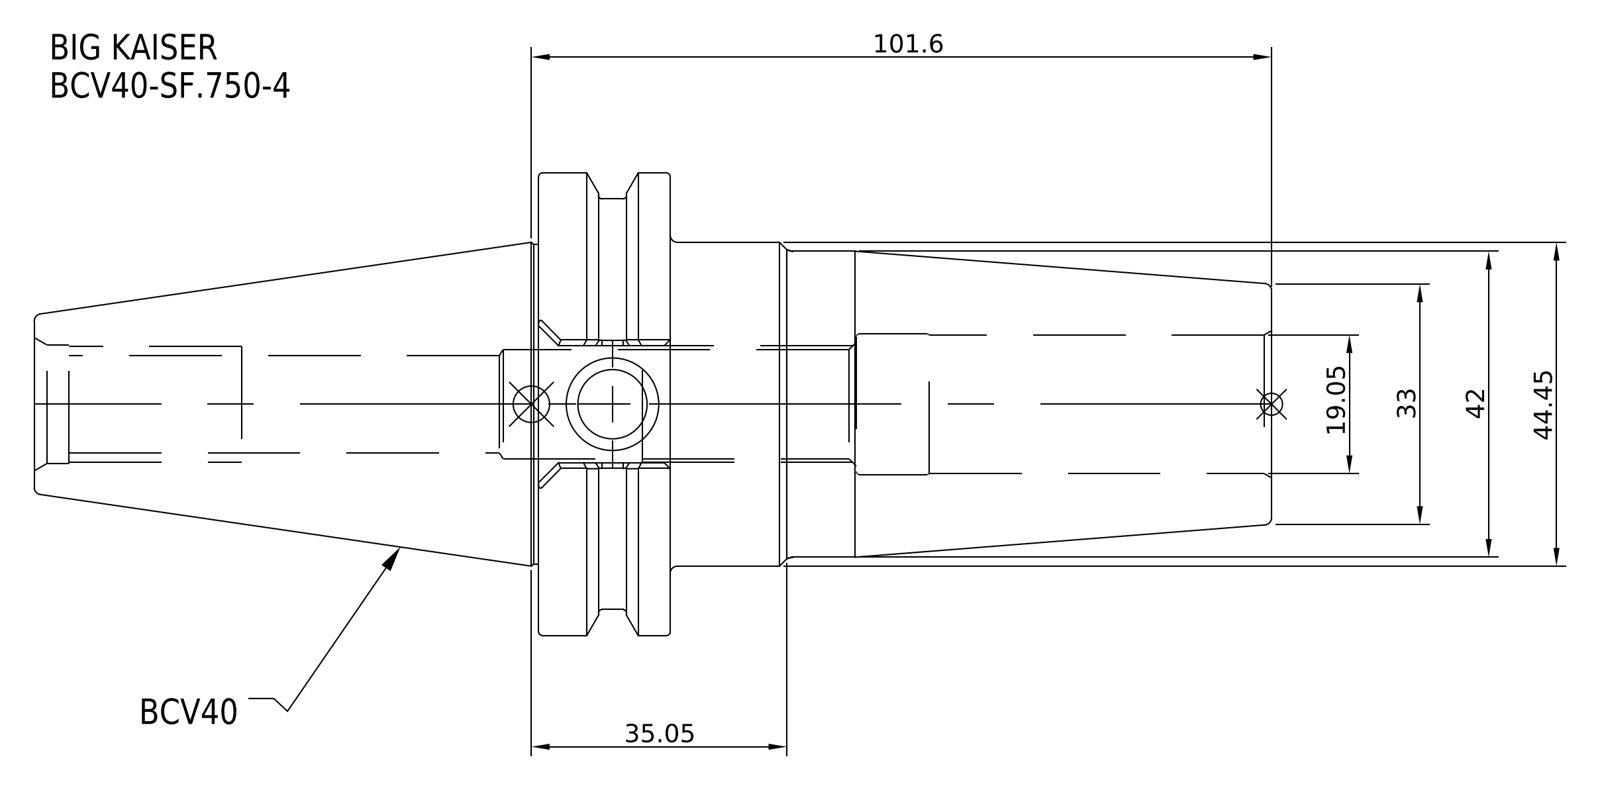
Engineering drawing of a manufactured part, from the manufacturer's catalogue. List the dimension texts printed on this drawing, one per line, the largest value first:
101.6
44.45
42
35.05
33
19.05
